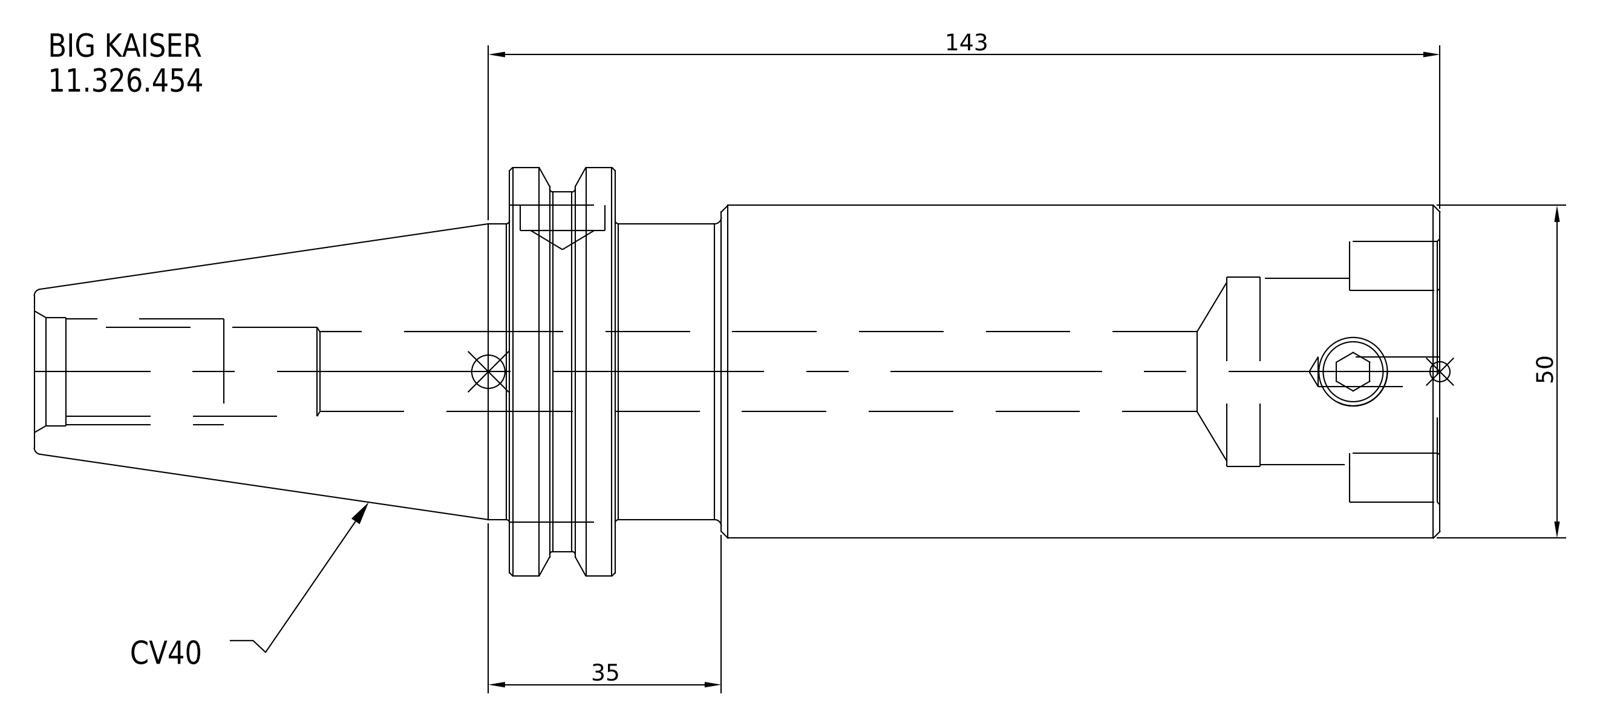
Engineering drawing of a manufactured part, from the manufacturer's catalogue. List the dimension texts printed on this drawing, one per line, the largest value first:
143
50
35
